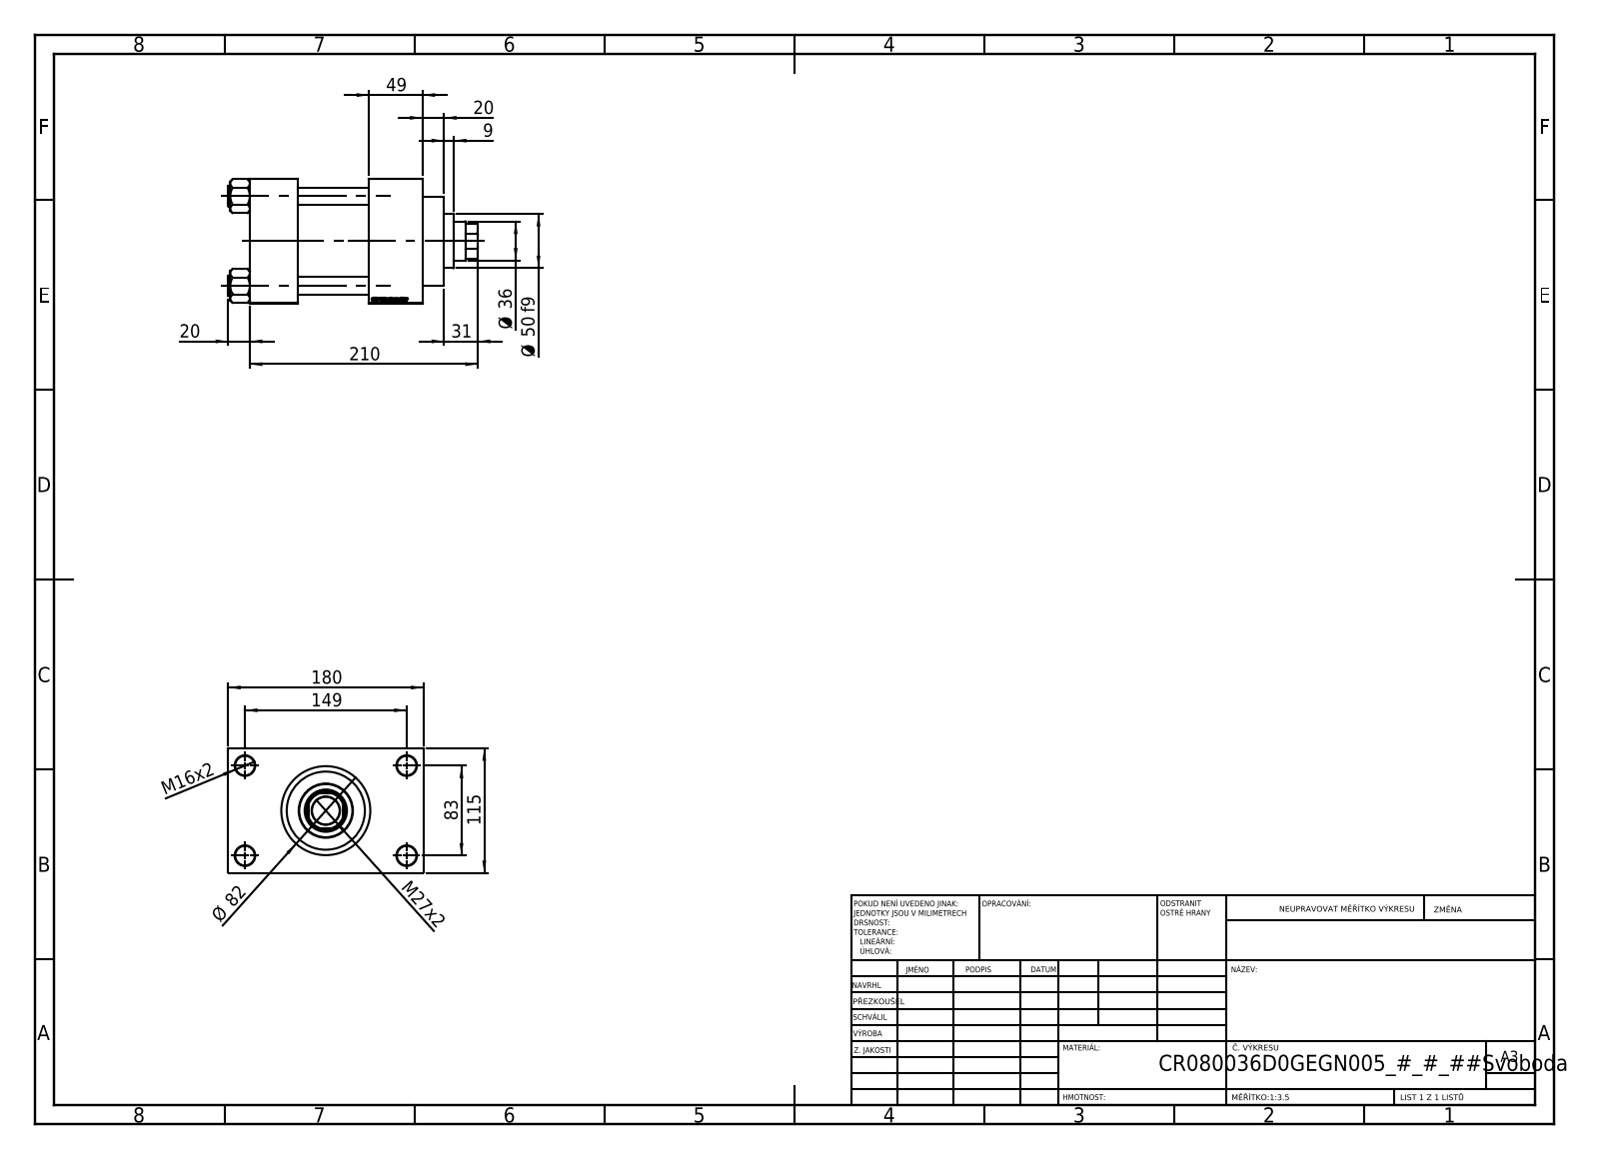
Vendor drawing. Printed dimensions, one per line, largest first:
210
180
149
115
83
Ø 82
Ø 50 f9
49
Ø 36
31
M27x2
20
20
M16x2
9
